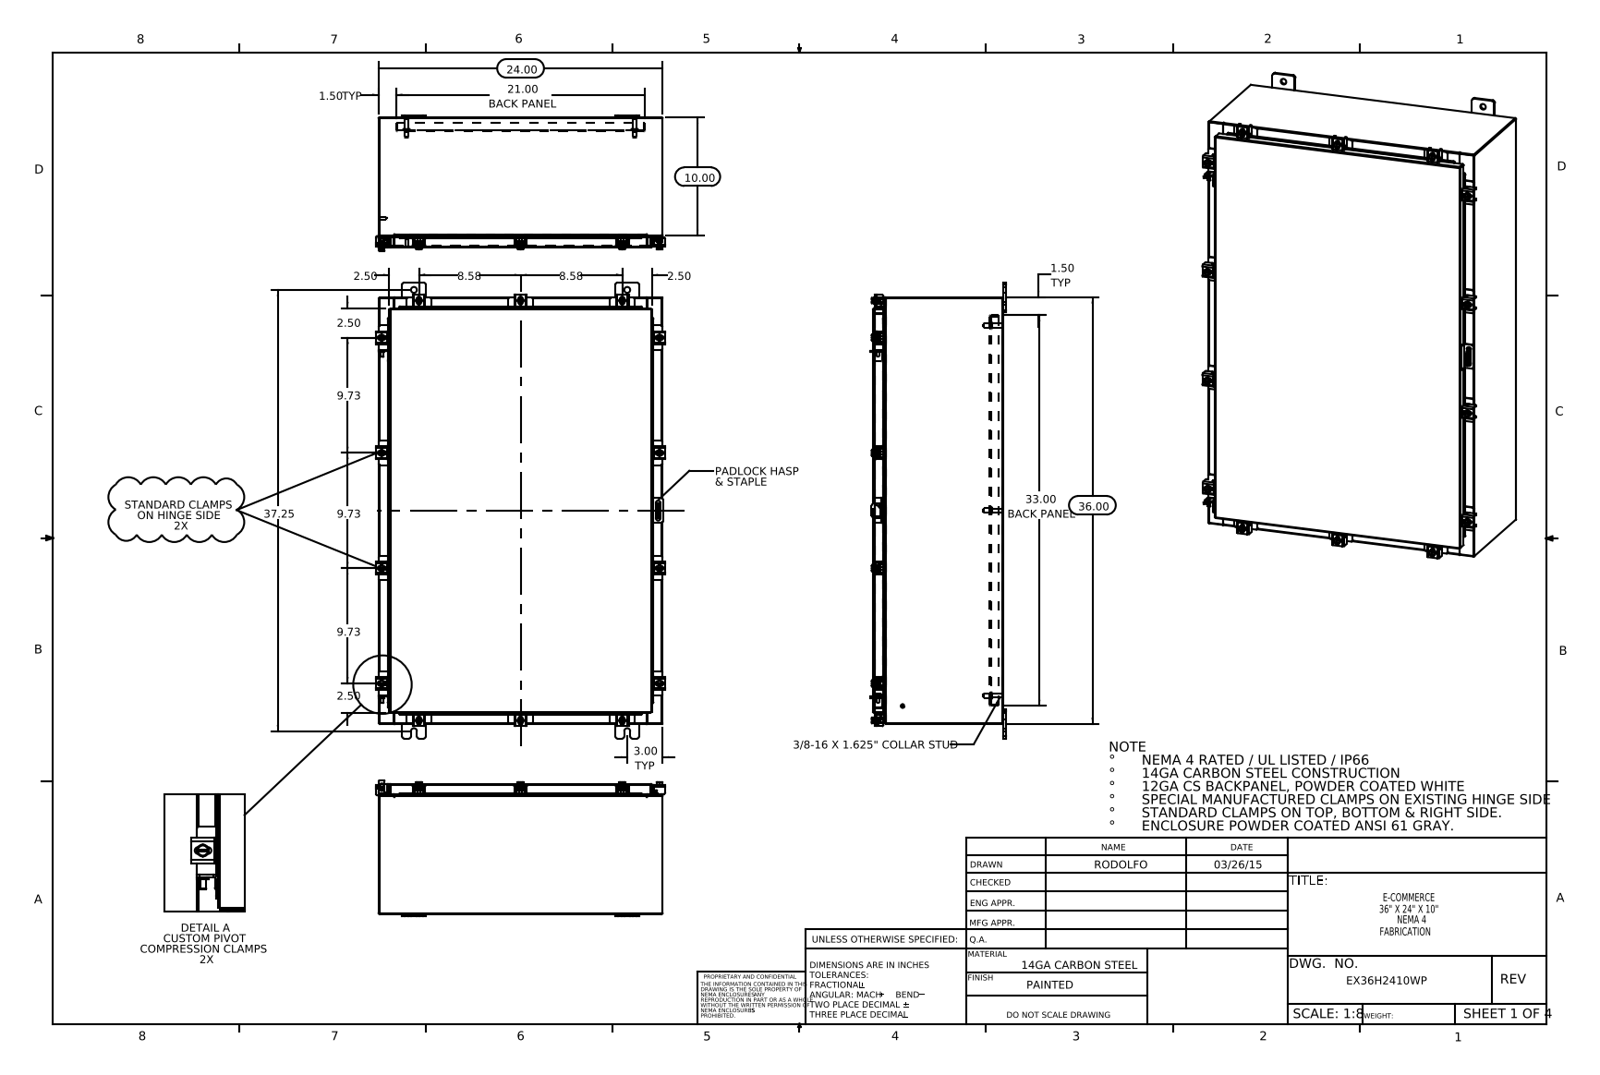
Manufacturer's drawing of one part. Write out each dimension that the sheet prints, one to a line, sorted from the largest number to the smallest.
37.25
36.00
33.00 BACK PANEL
24.00
21.00 BACK PANEL
10.00
9.73
9.73
9.73
8.58
8.58
3.00 TYP
2.50
2.50
2.50
2.50
1.50 TYP
1.50 TYP
